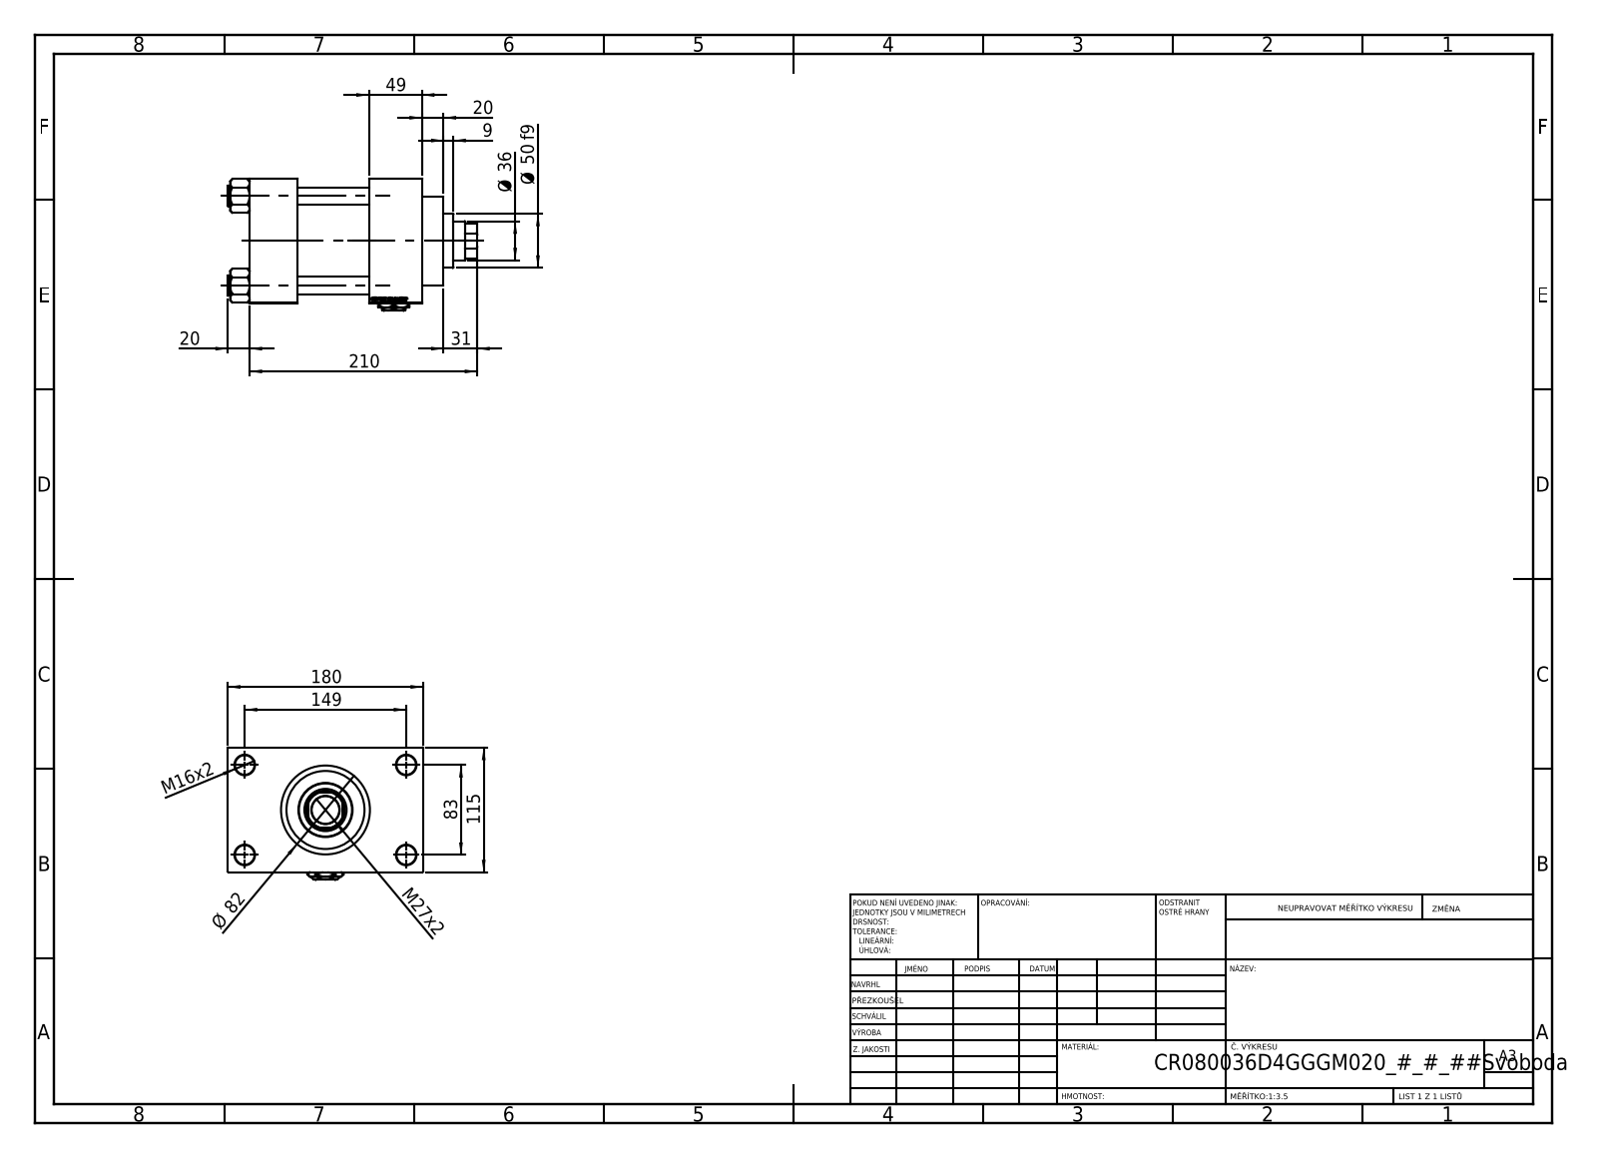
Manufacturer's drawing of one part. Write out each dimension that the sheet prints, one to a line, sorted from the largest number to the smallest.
210
180
149
115
83
Ø 82
Ø 50 f9
49
Ø 36
31
M27x2
20
20
M16x2
9
